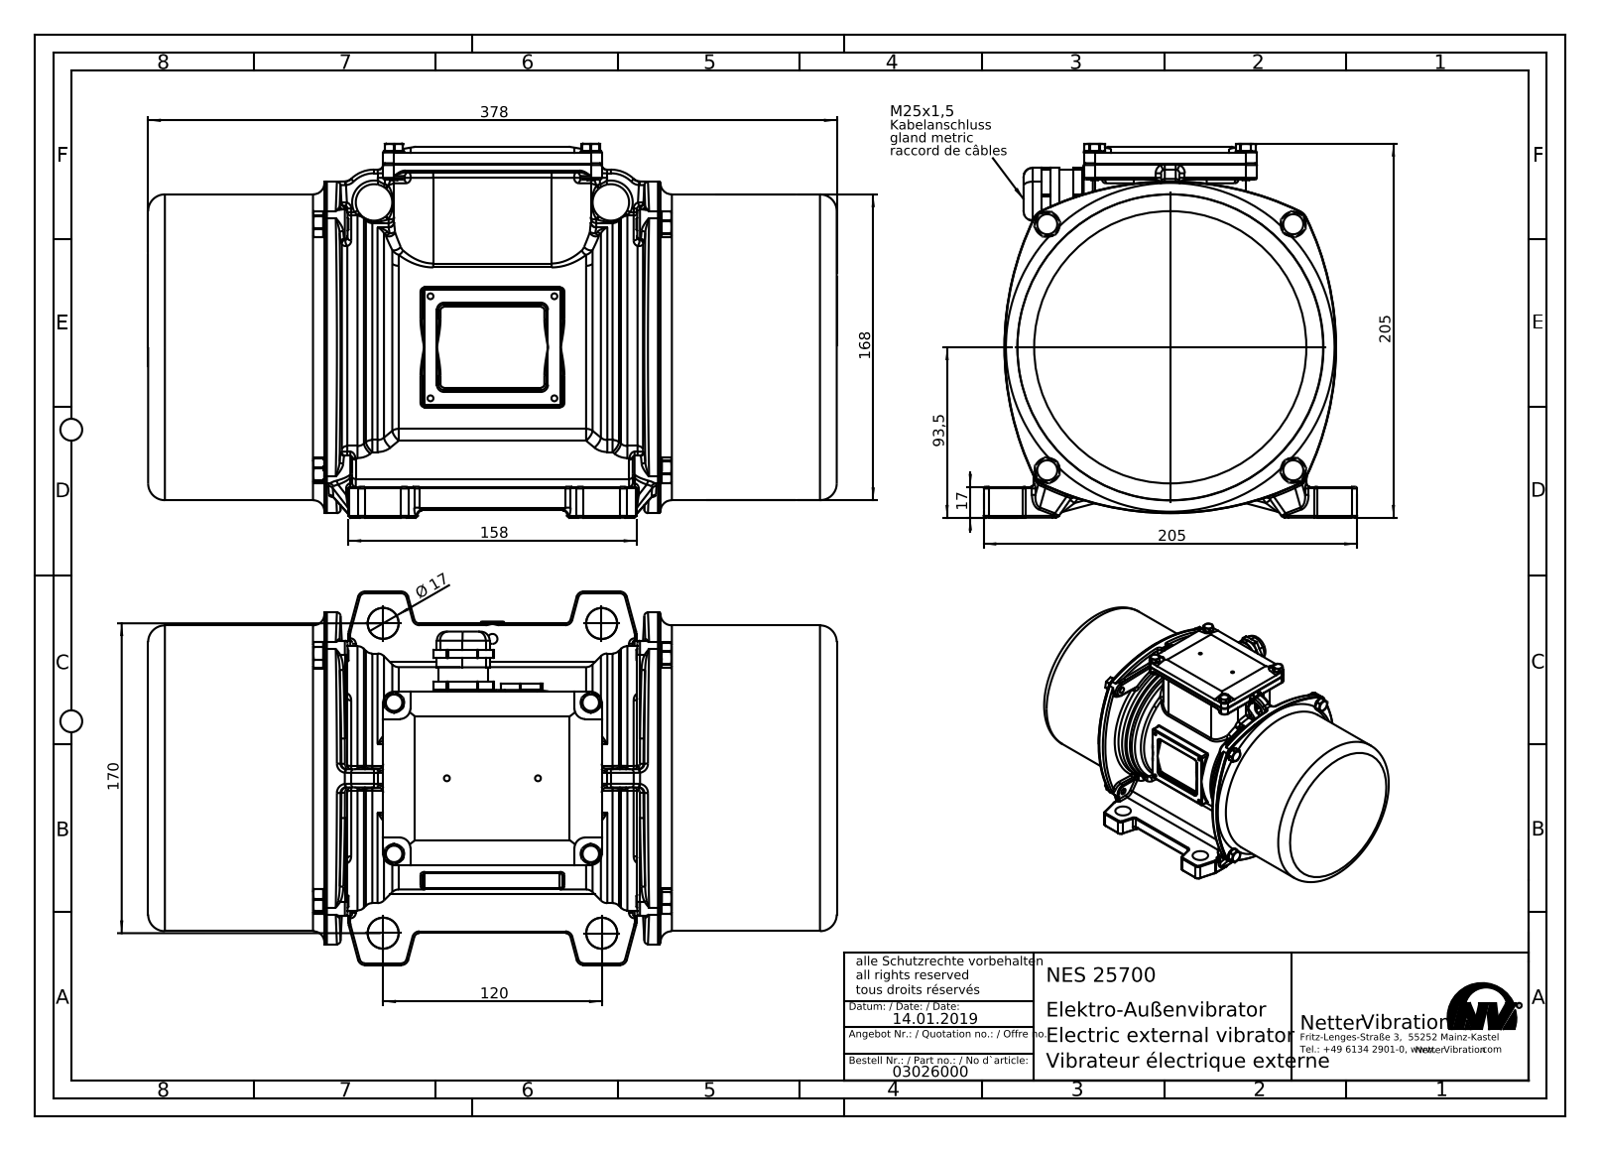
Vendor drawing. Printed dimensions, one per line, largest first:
378
205
205
170
168
158
120
93,5
Ø 17
17
